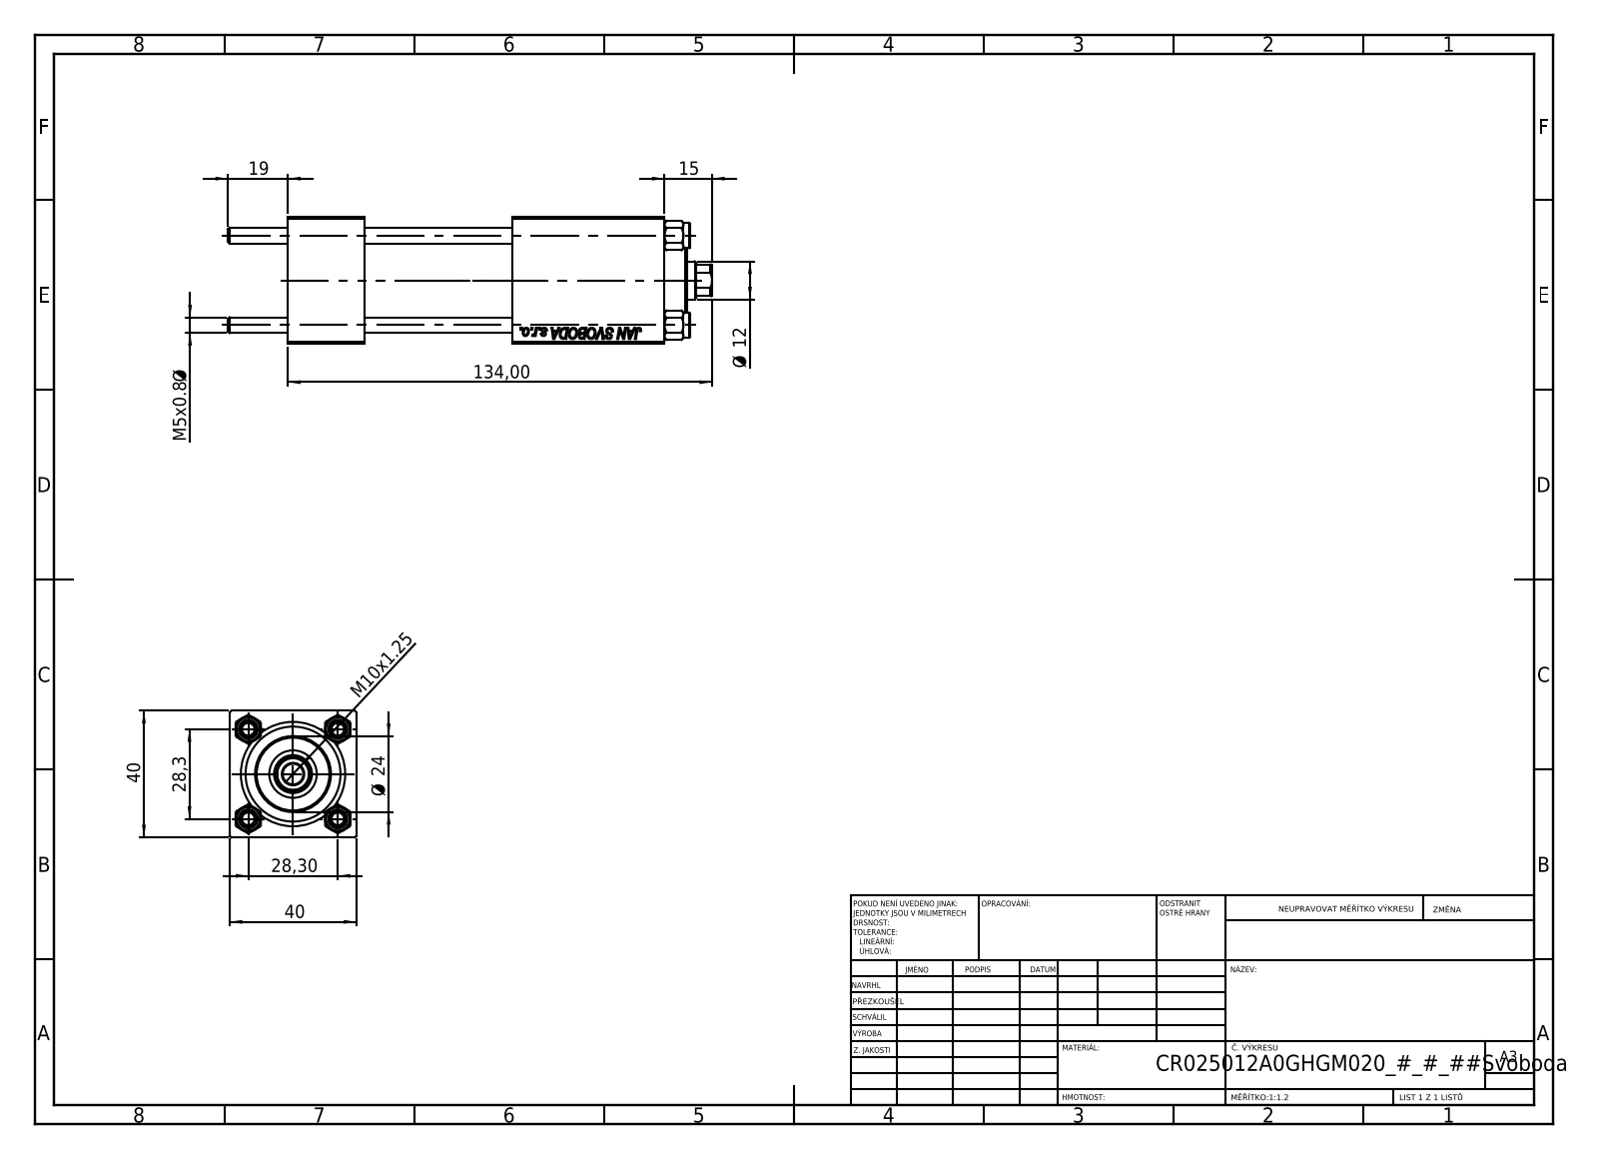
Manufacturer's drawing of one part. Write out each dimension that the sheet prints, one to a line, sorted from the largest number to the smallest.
134,00
40
40
28,3
28,30
Ø 24
19
15
Ø 12
M10x1.25
M5x0.8 Ø
